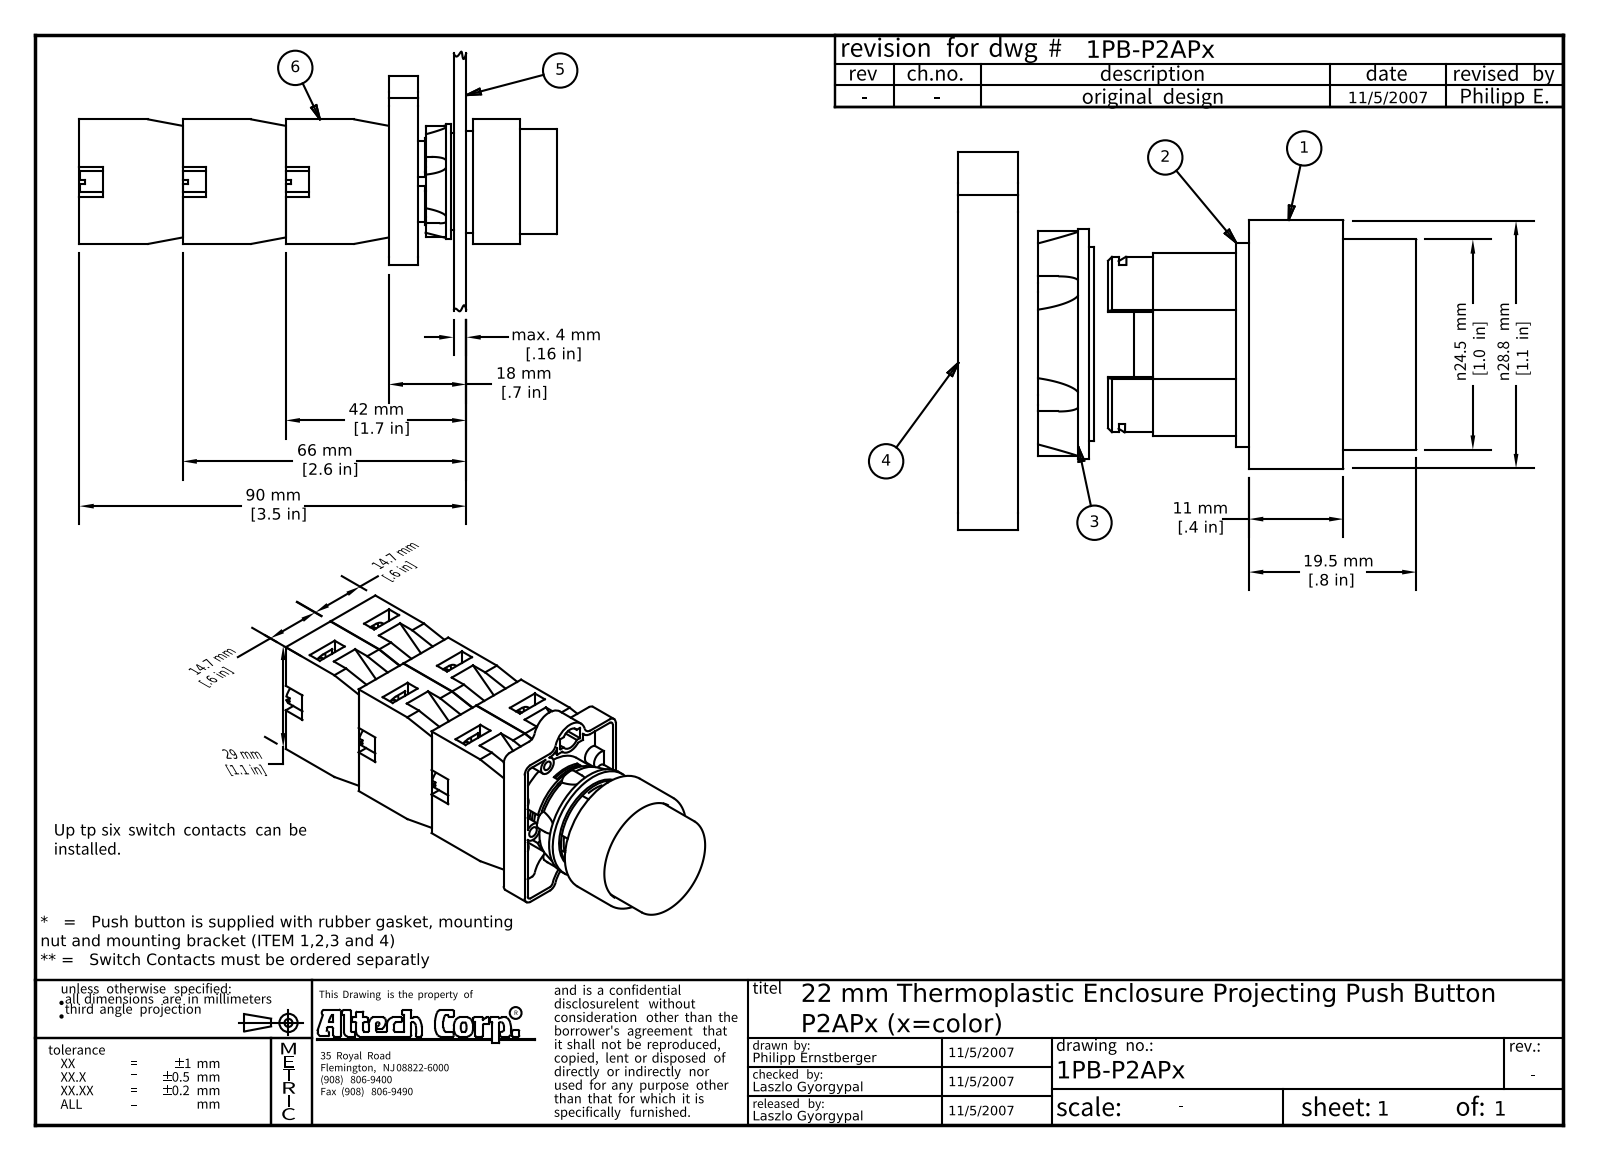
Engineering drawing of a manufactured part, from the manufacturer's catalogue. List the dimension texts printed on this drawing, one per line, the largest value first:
90 mm [3.5 in]
66 mm [2.6 in]
42 mm [1.7 in]
29 mm [1.1 in]
n28.8 mm [1.1 in]
n24.5 mm [1.0 in]
19.5 mm [.8 in]
18 mm [.7 in]
14.7 mm [.6 in]
14.7 mm [.6 in]
11 mm [.4 in]
max. 4 mm [.16 in]
